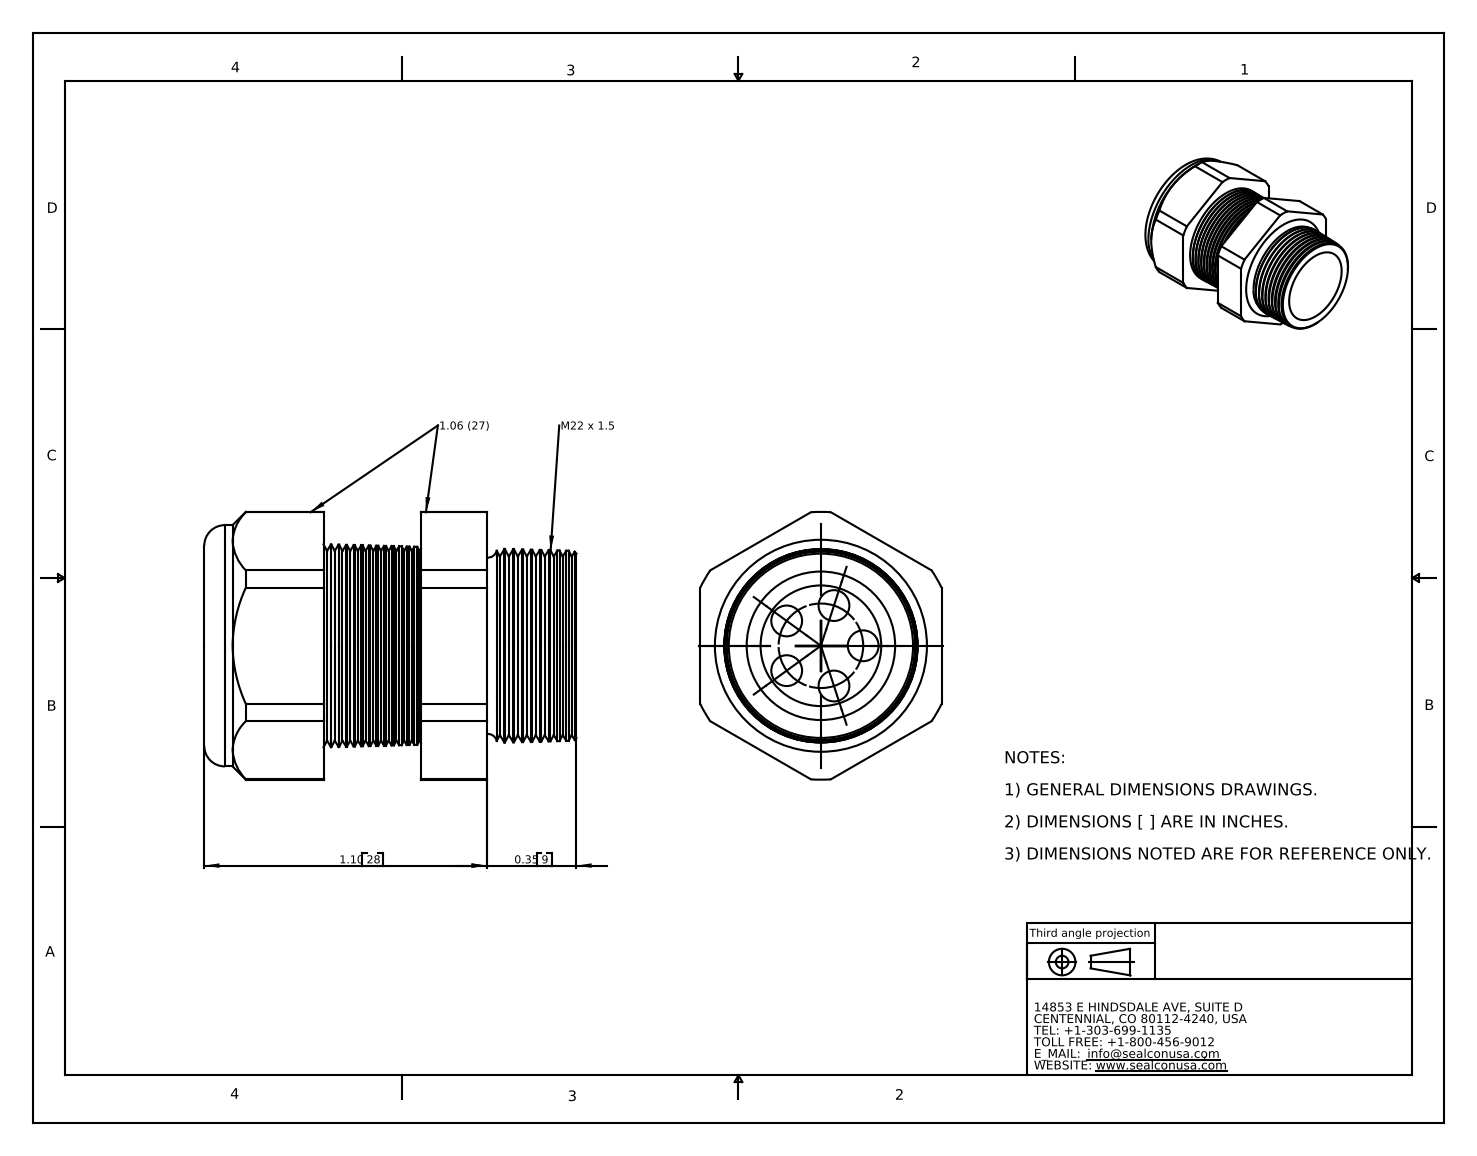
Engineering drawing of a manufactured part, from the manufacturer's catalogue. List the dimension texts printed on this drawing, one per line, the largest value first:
1.10 28
0.35 9
